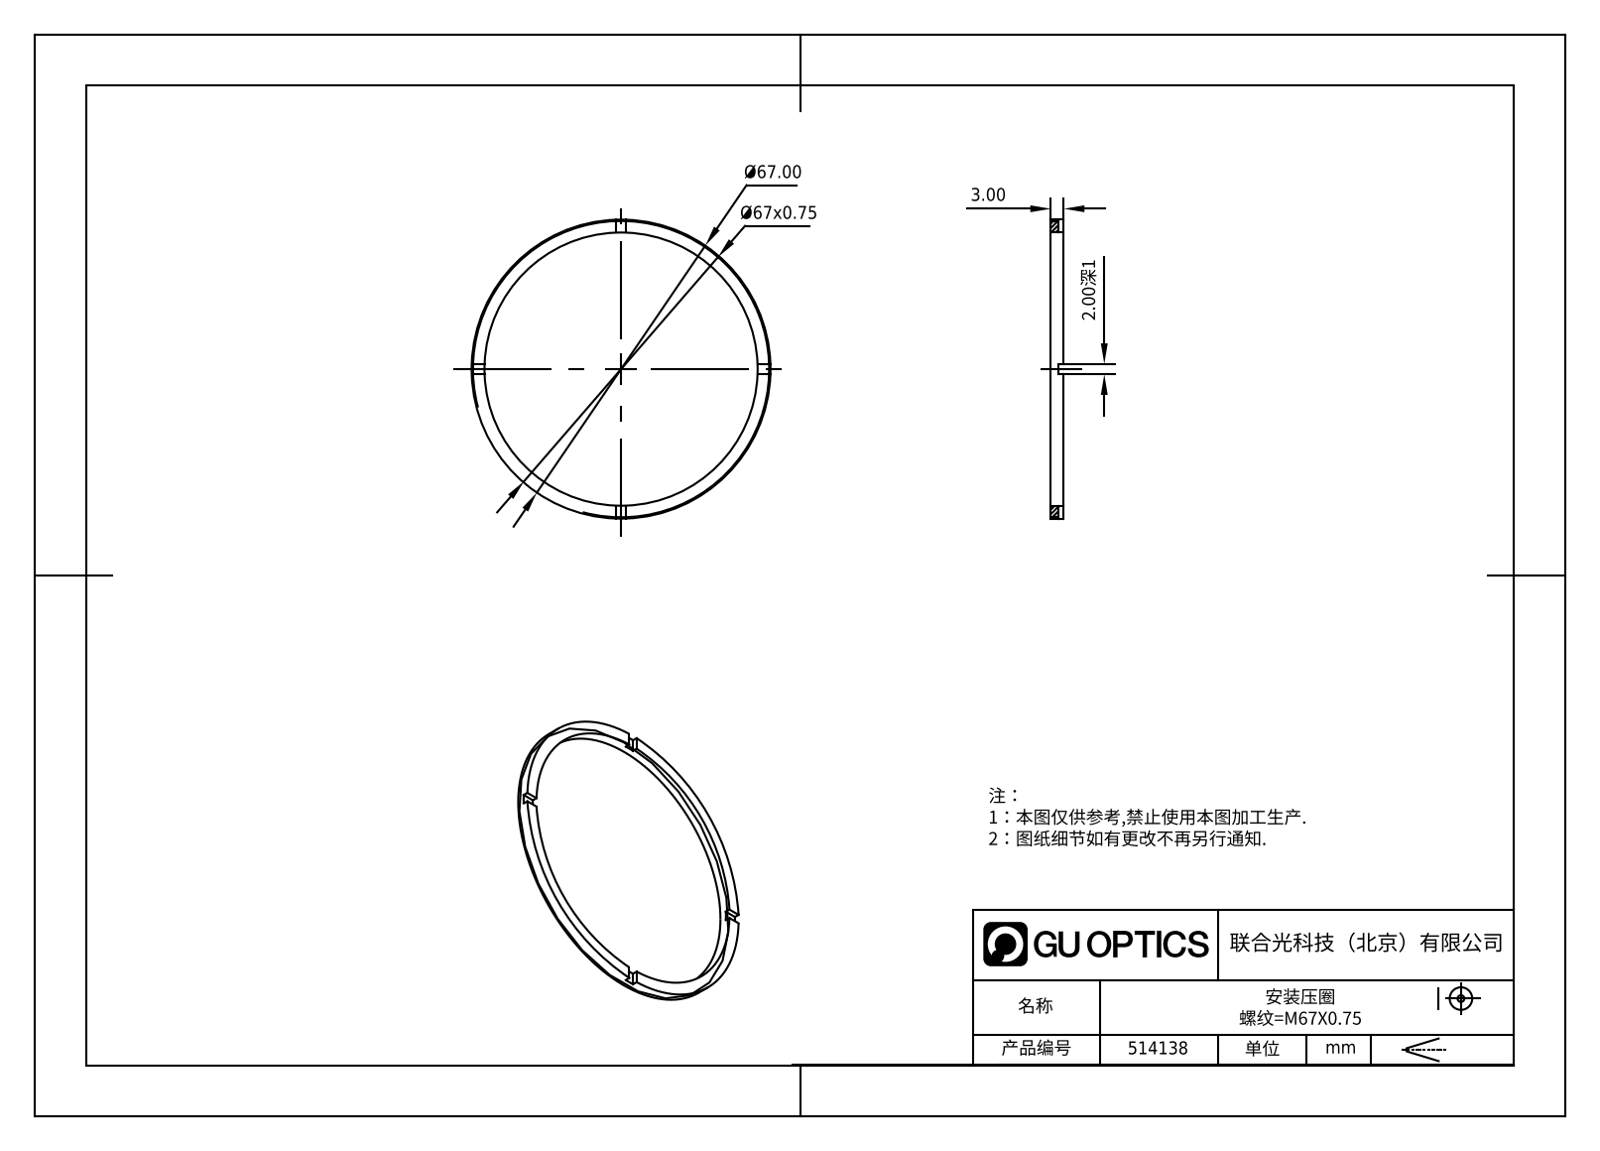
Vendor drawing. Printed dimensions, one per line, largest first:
Ø67.00
Ø67x0.75
3.00
2.00深1
